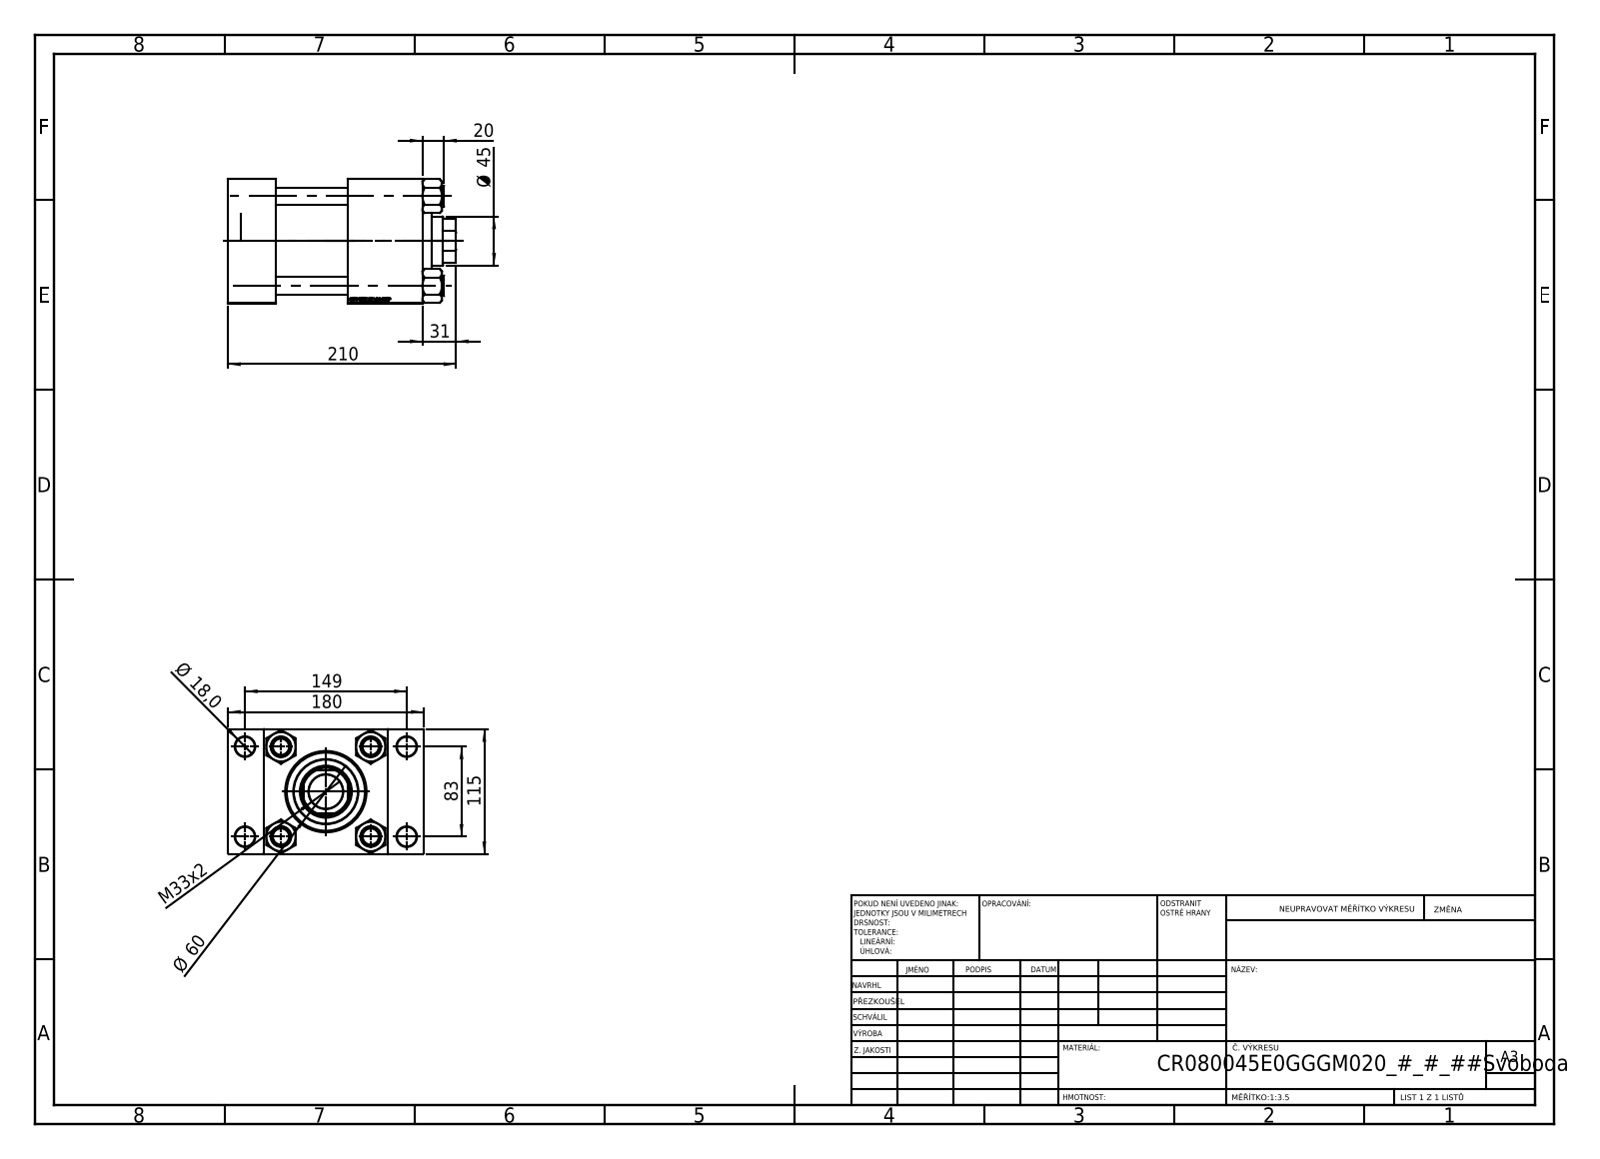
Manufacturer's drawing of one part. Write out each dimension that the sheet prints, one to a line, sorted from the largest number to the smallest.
210
180
149
115
83
Ø 60
Ø 45
M33x2
31
20
Ø 18,0
